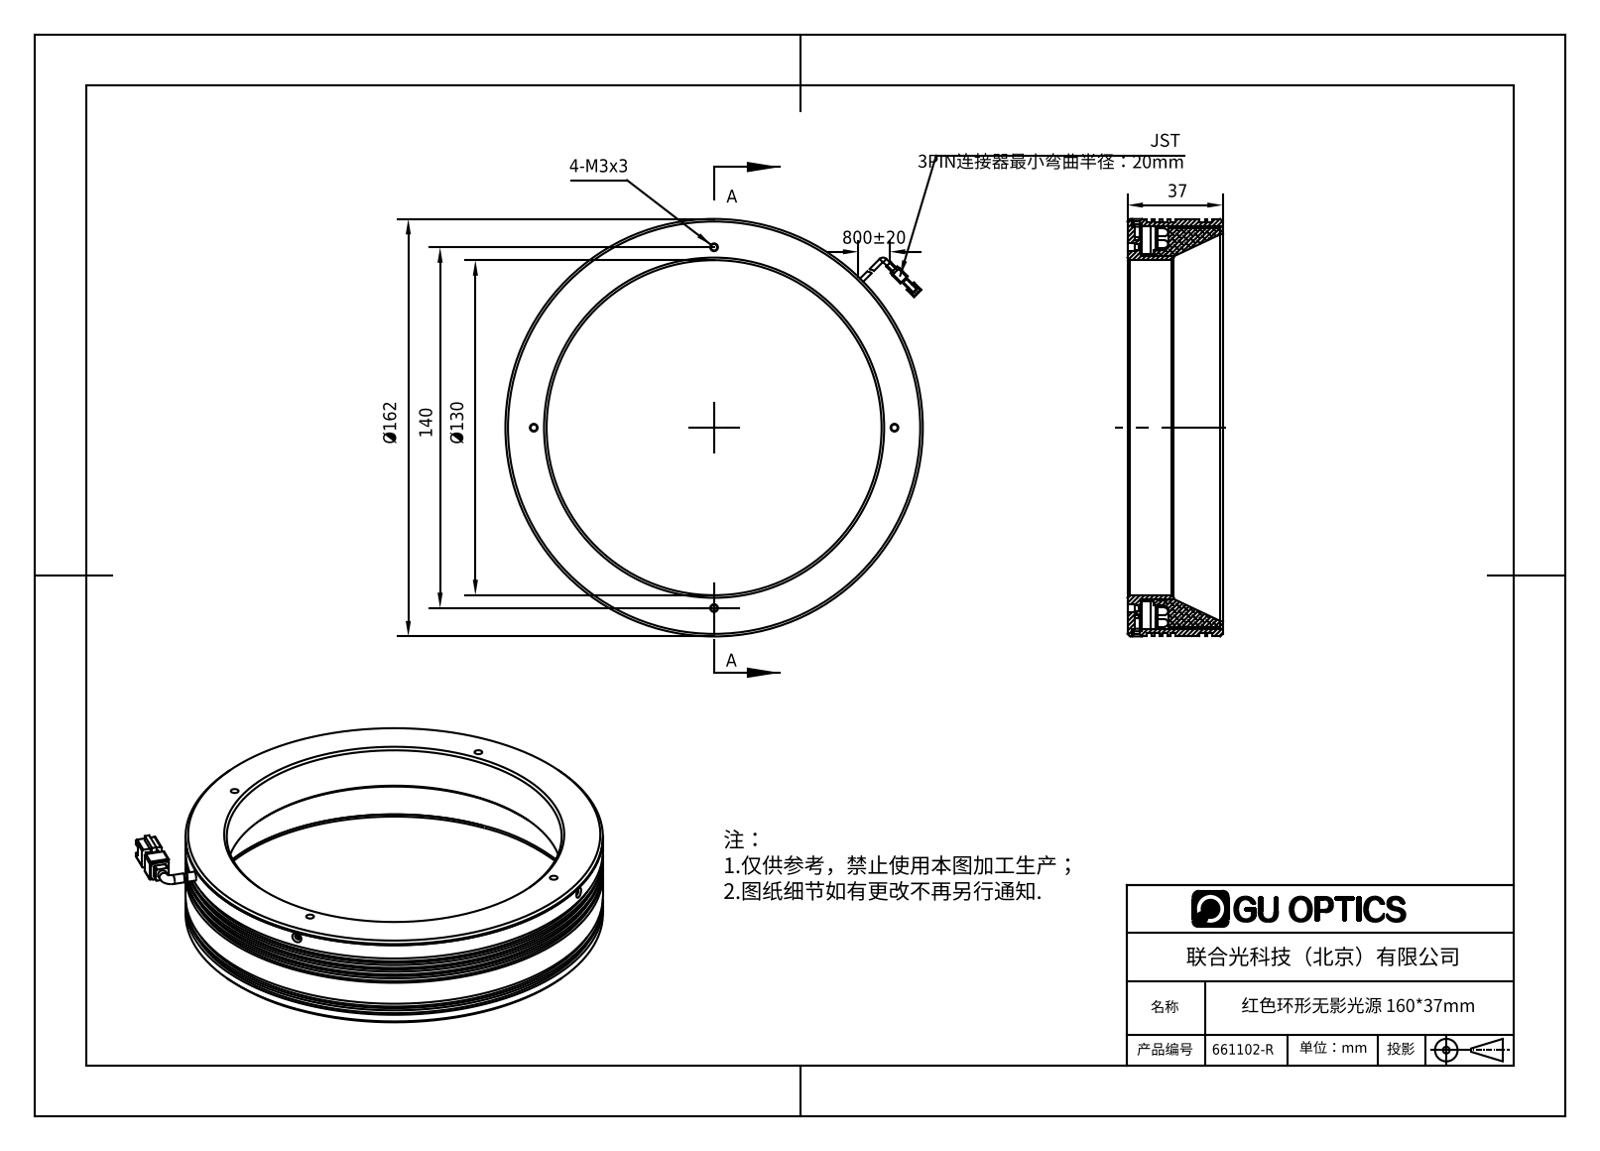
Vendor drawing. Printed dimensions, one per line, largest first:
800±20
Ø162
140
Ø130
37
